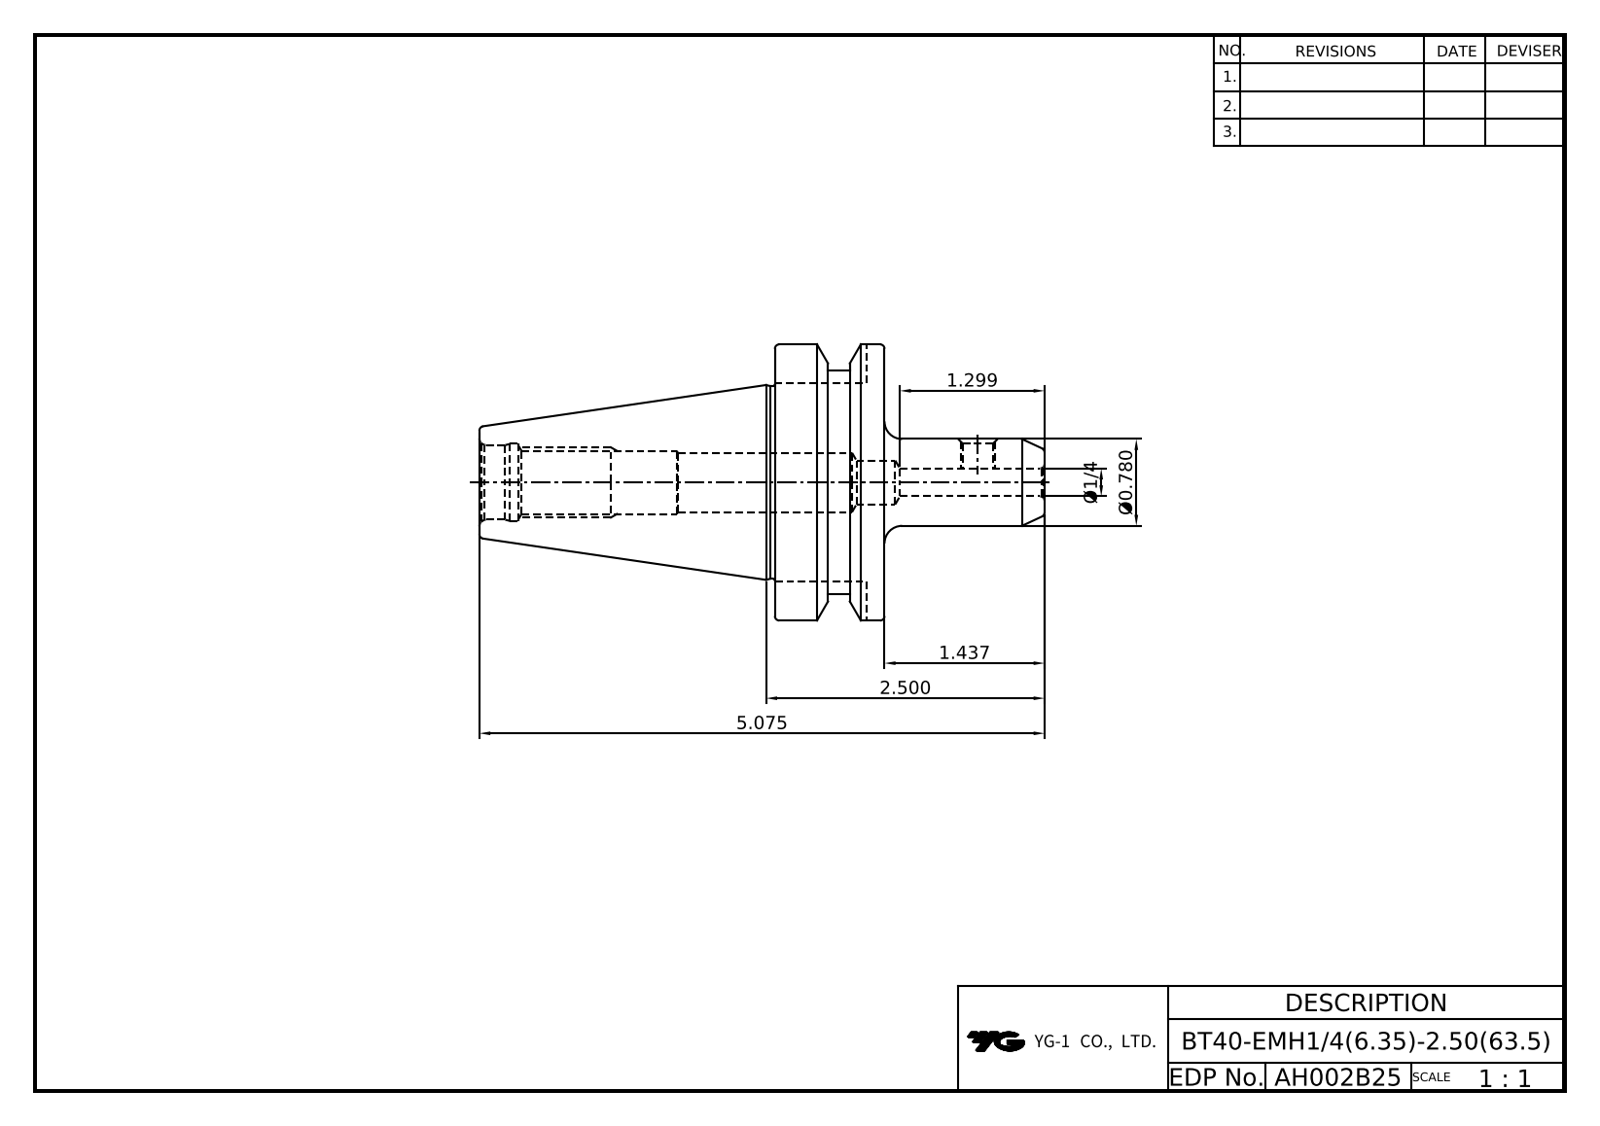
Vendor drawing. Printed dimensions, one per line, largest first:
5.075
2.500
1.437
1.299
Ø0.780
Ø1/4
